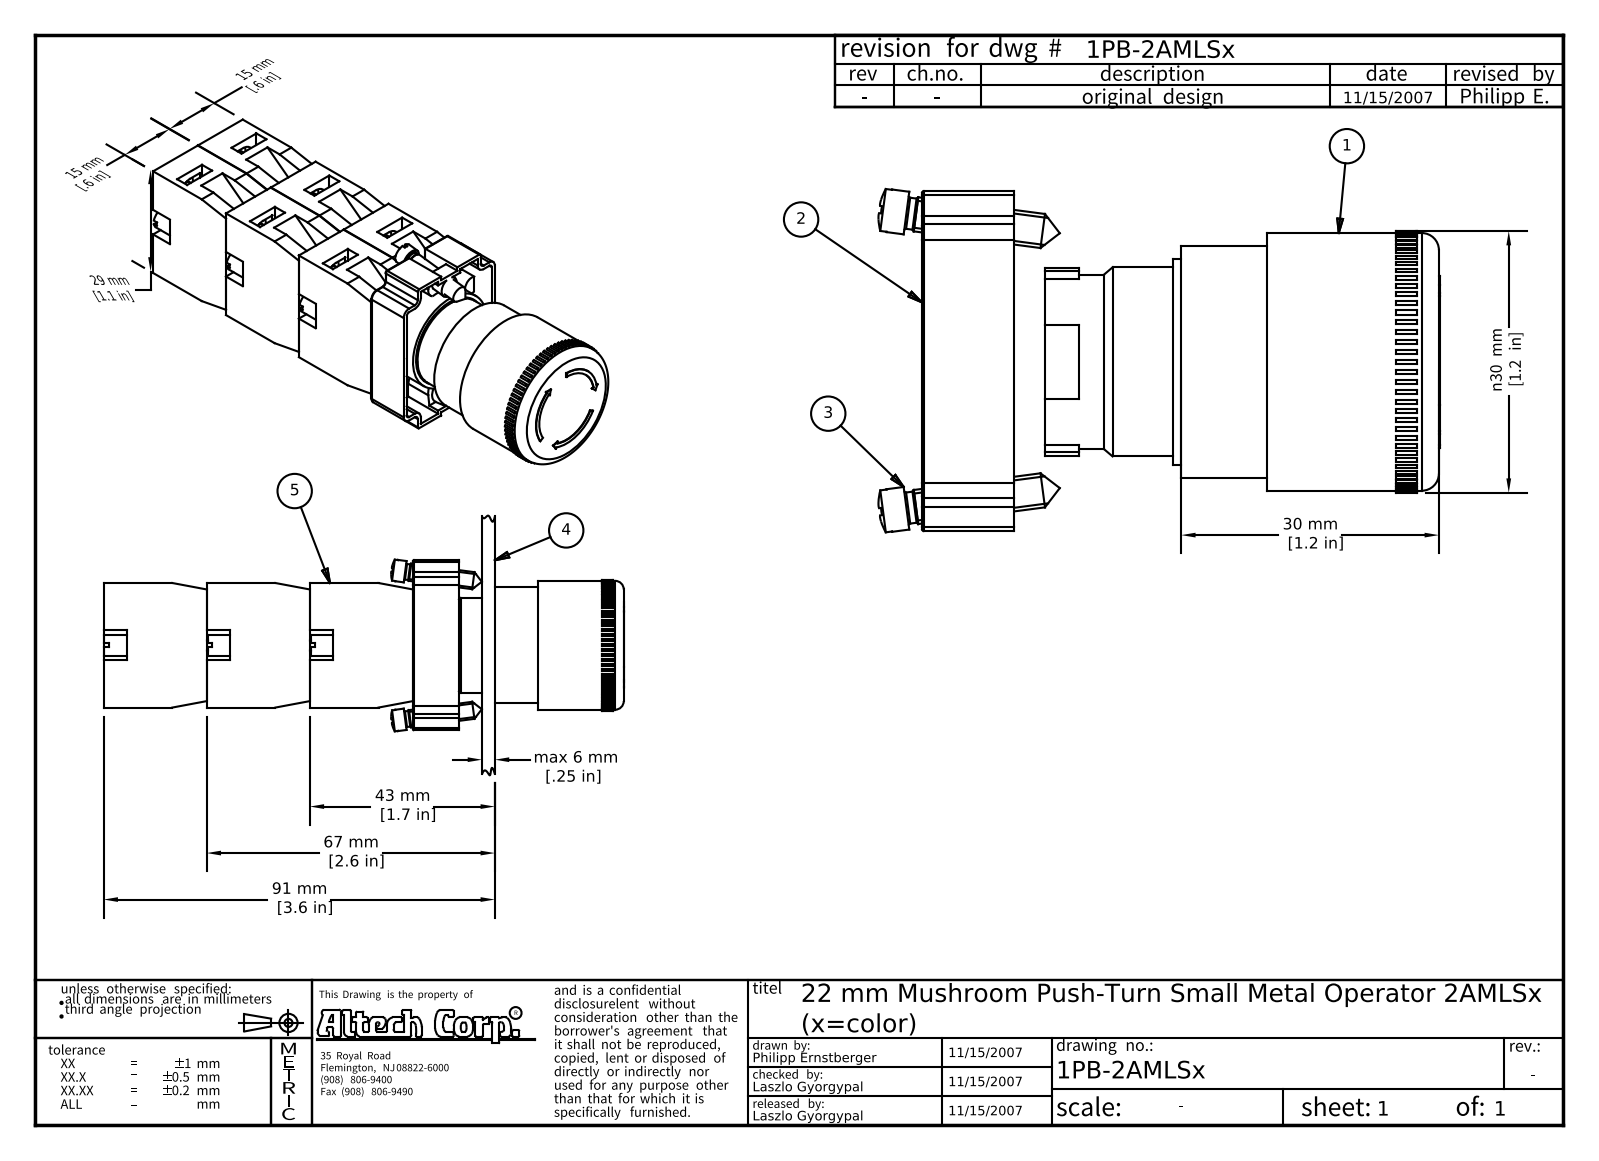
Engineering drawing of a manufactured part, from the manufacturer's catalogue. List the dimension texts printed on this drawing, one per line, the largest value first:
91 mm [3.6 in]
67 mm [2.6 in]
43 mm [1.7 in]
n30 mm [1.2 in]
30 mm [1.2 in]
29 mm [1.1 in]
15 mm [.6 in]
15 mm [.6 in]
max 6 mm [.25 in]
